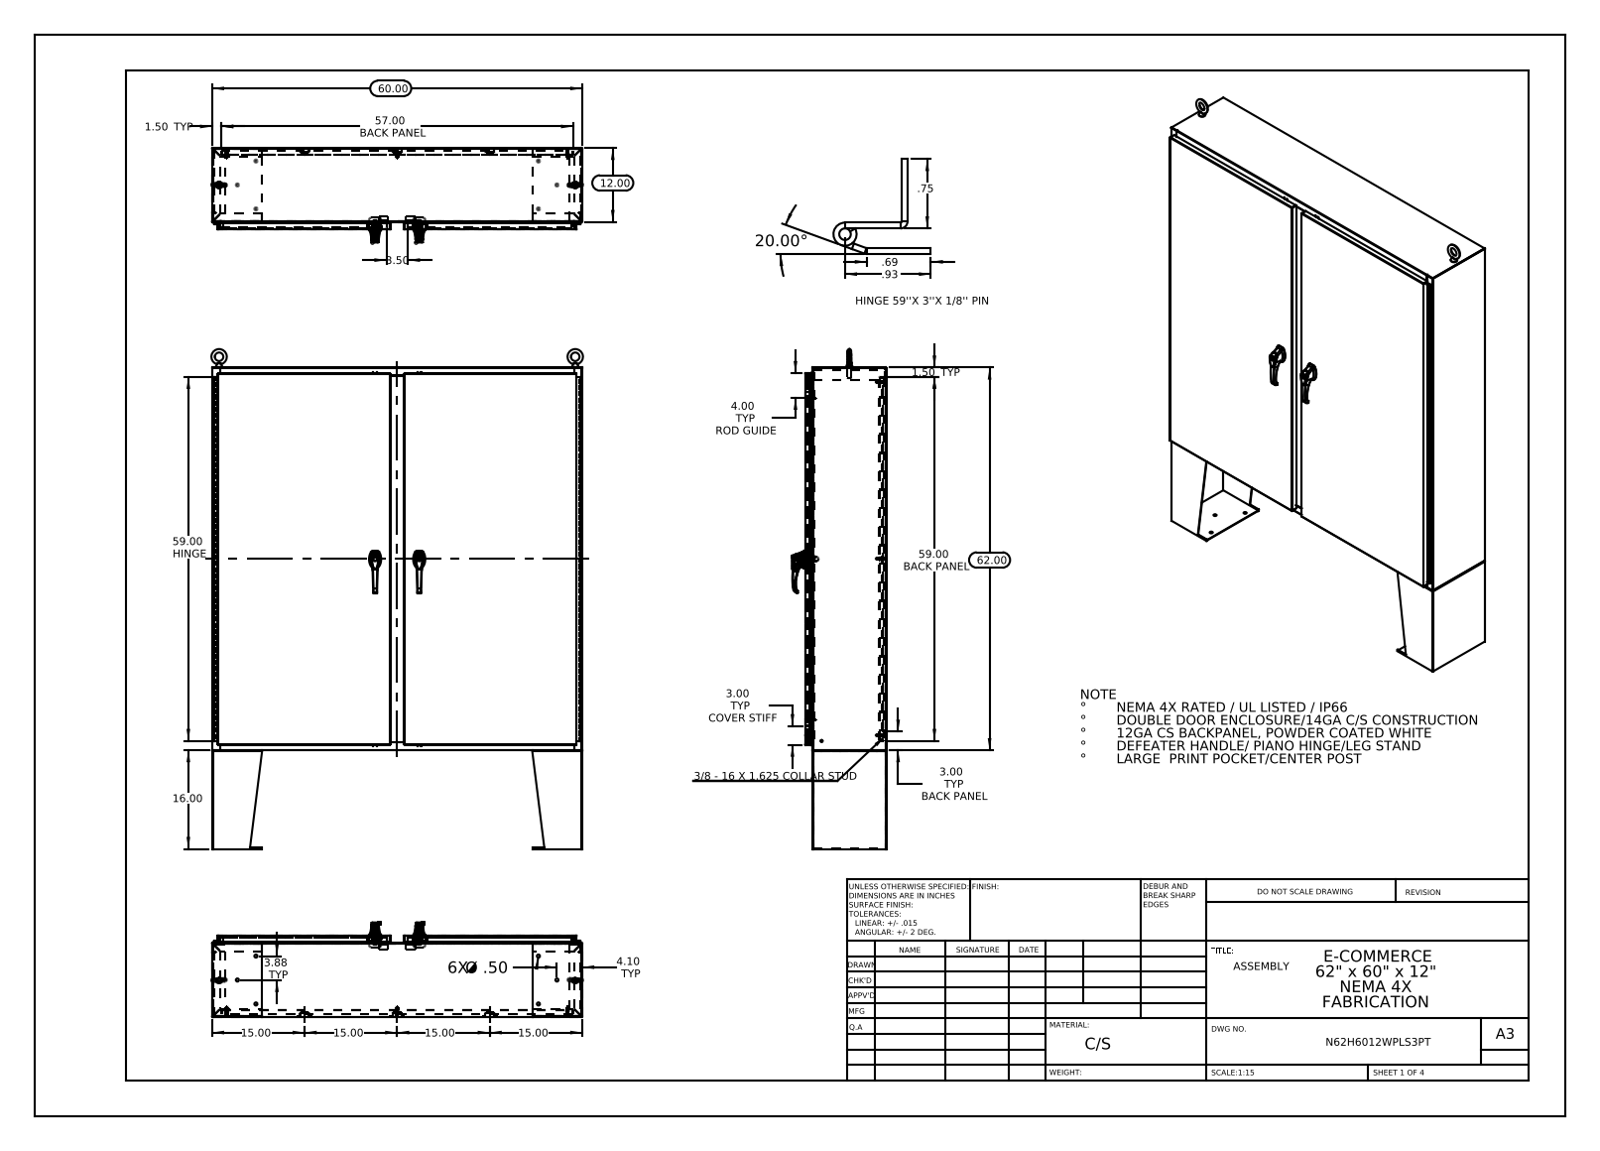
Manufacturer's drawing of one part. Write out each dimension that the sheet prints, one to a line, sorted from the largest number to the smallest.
62.00
60.00
59.00 HINGE
59.00 BACK PANEL
57.00 BACK PANEL
20.00°
16.00
15.00
15.00
15.00
15.00
12.00
4.10 TYP
4.00 TYP ROD GUIDE
3.88 TYP
3.50
3.00 TYP BACK PANEL
3.00 TYP COVER STIFF
1.50 TYP
1.50 TYP
.93
.75
.69
6X Ø .50
